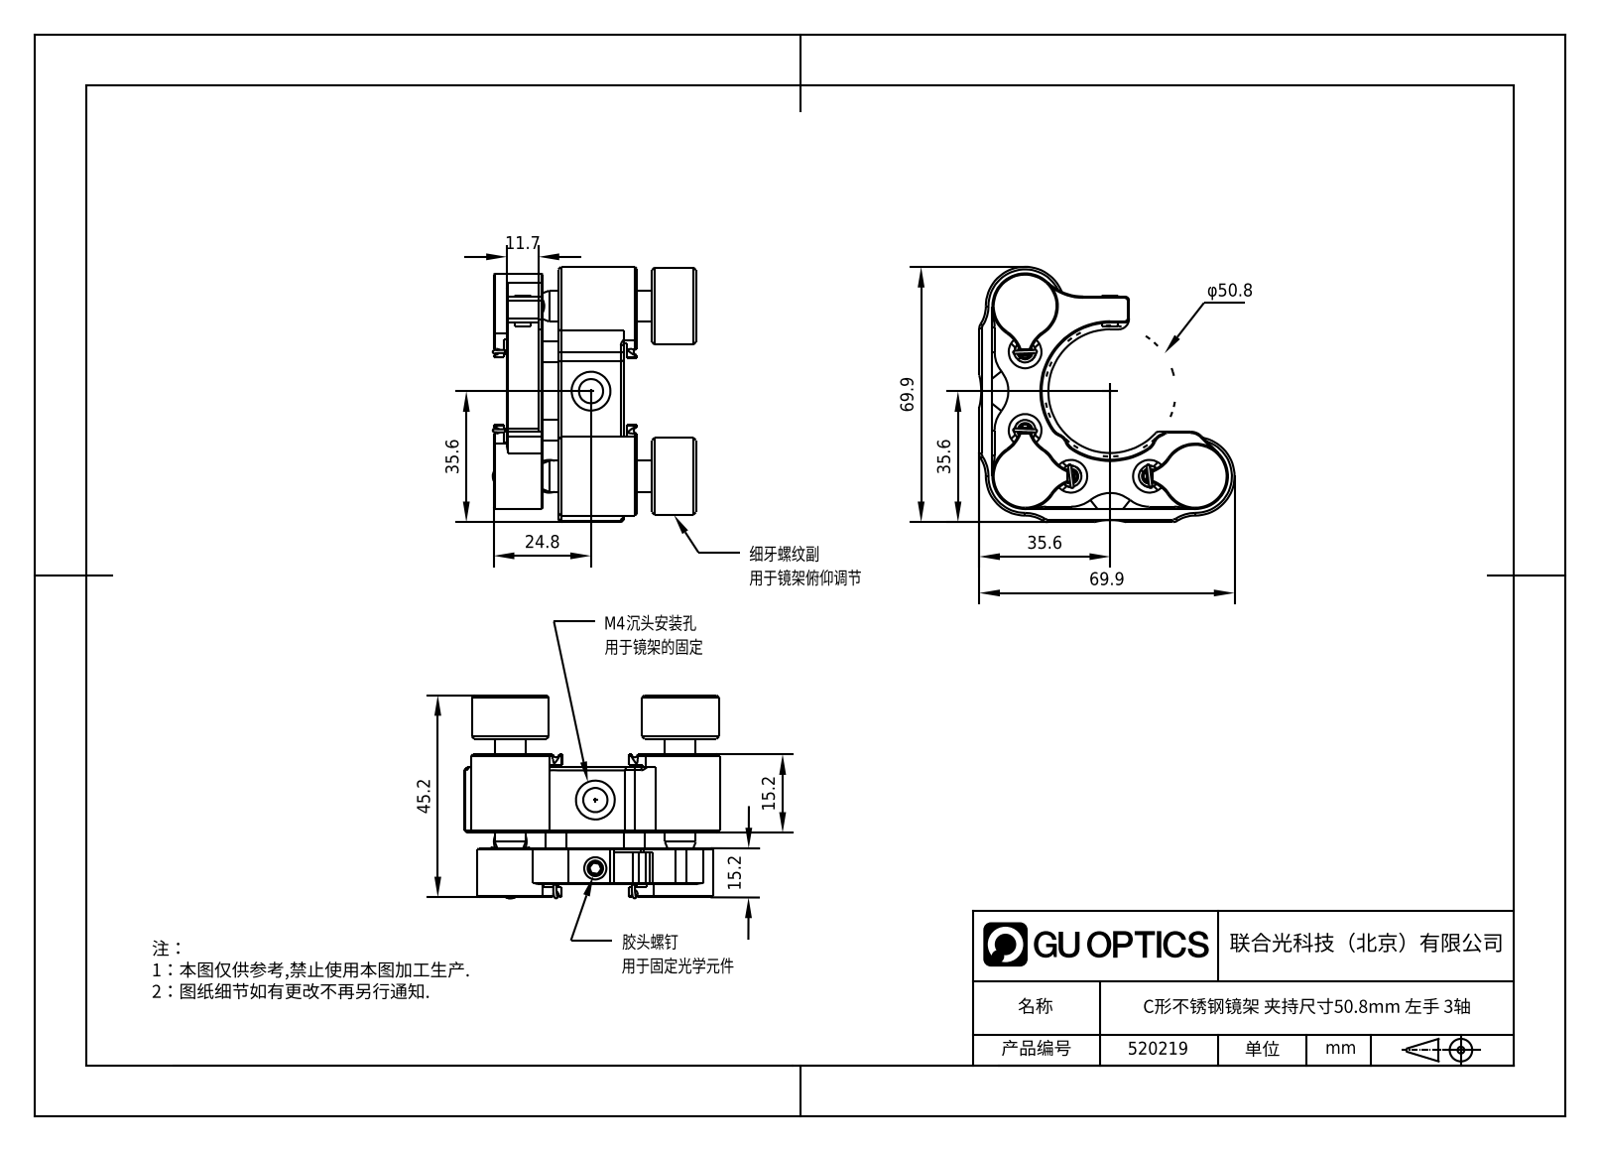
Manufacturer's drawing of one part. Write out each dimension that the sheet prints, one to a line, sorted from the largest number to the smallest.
69.9
69.9
45.2
35.6
35.6
35.6
24.8
15.2
15.2
11.7
